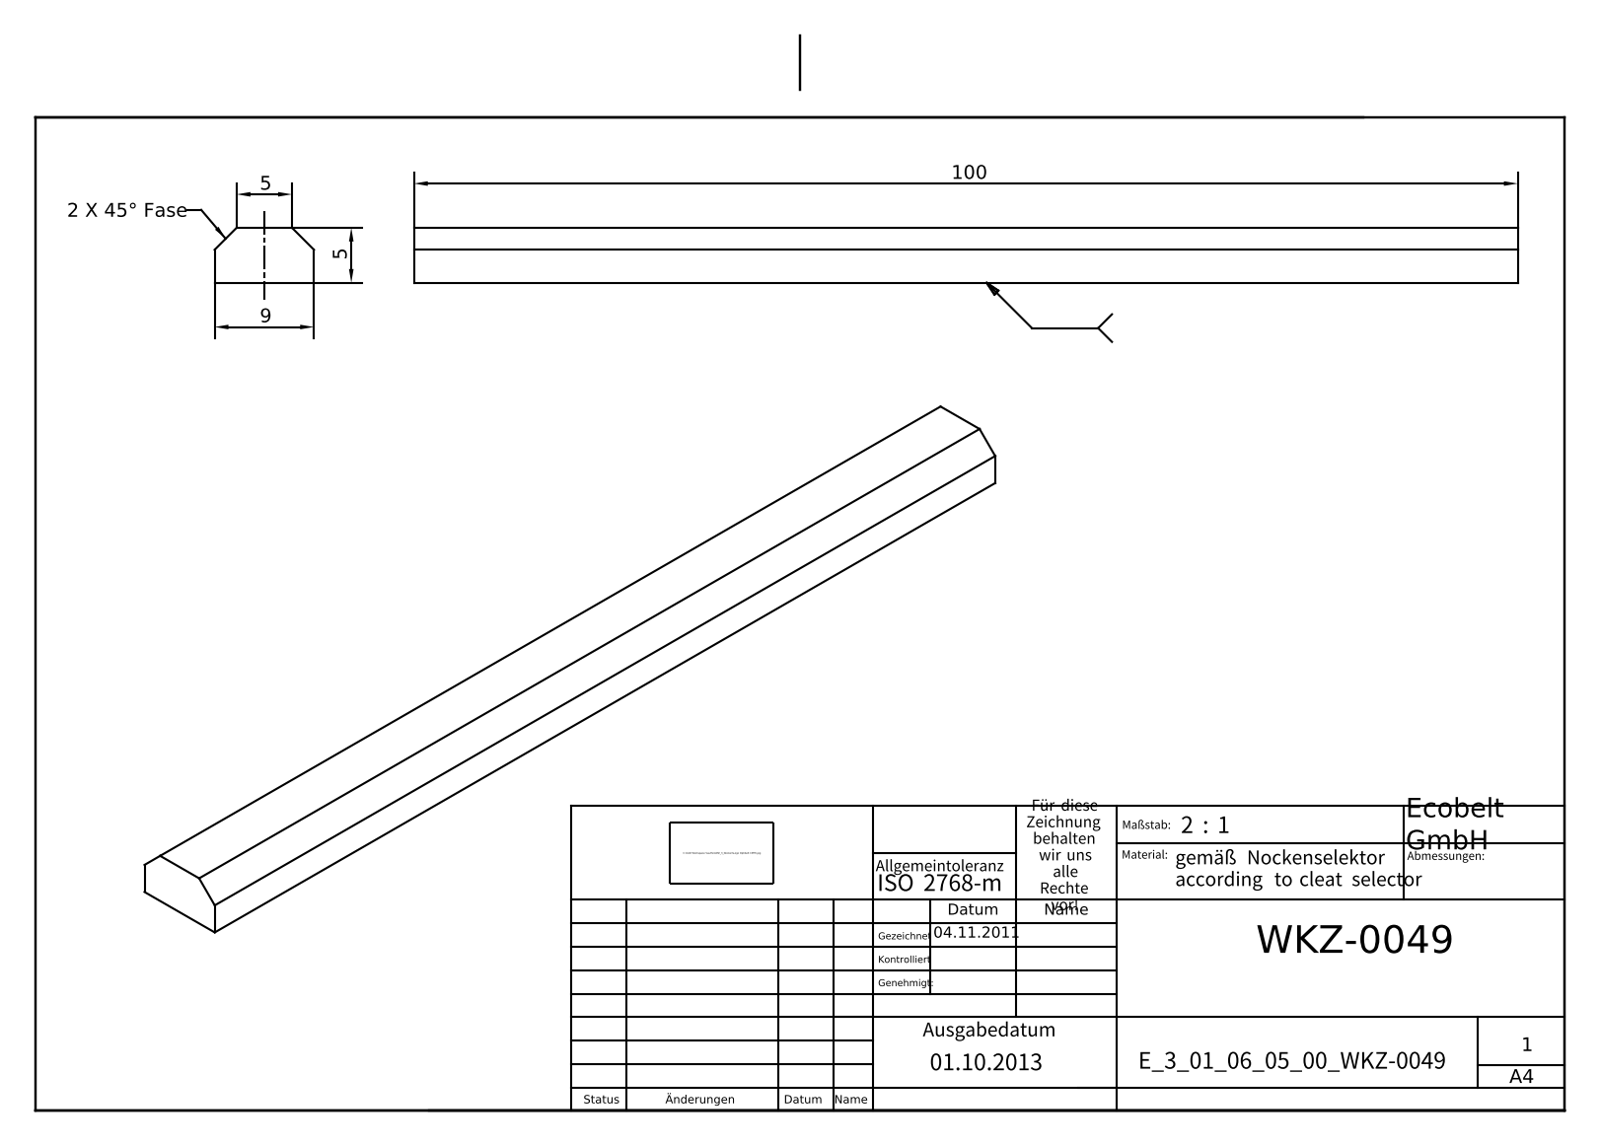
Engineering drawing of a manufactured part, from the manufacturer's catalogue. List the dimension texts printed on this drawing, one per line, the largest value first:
100
9
5
5
